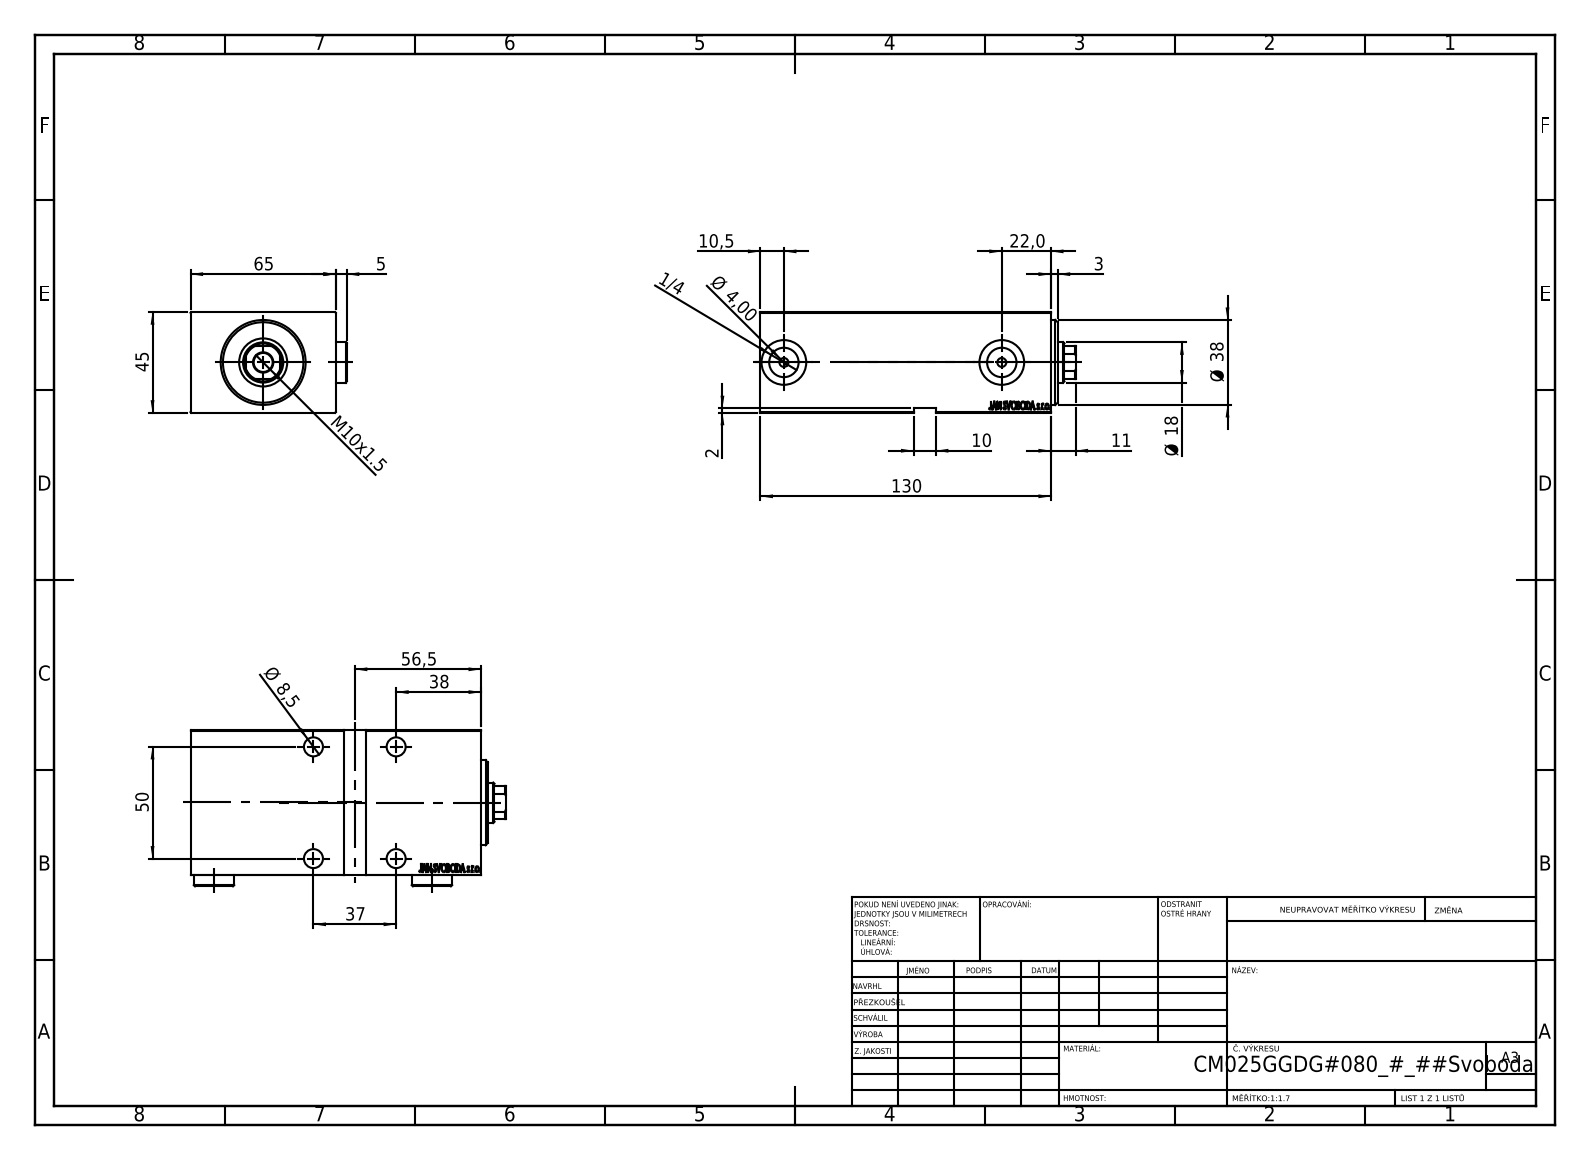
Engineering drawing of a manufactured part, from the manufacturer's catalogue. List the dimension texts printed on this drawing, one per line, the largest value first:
130
65
56,5
50
45
Ø 38
38
37
22,0
Ø 18
11
10,5
M10x1.5
10
Ø 8,5
5
Ø 4,00
3
2
1/4
